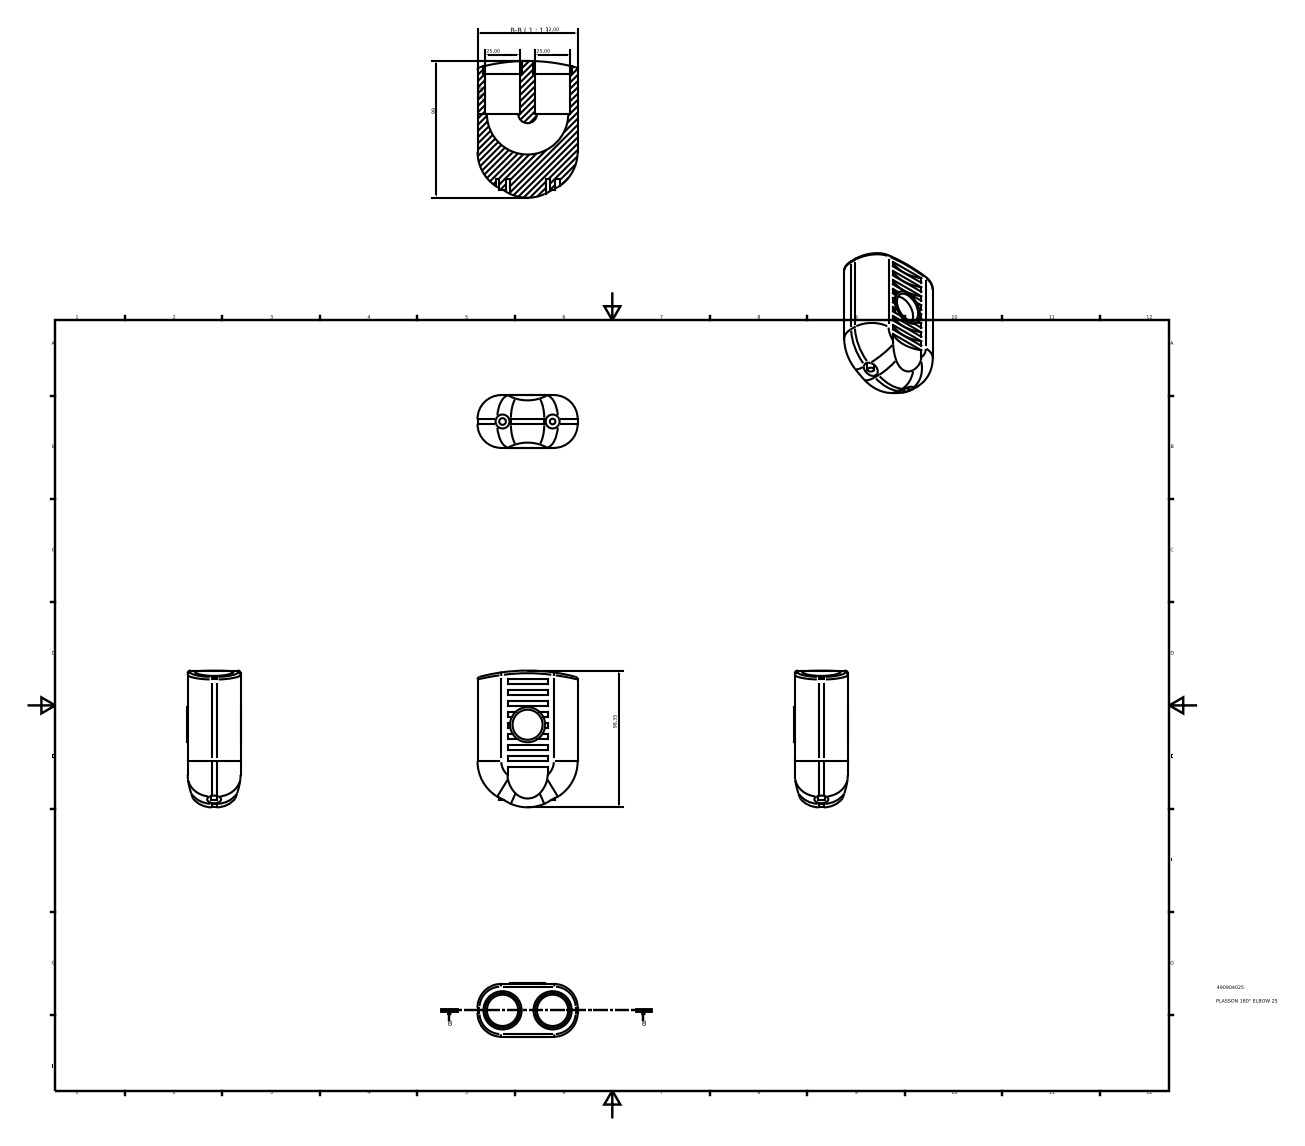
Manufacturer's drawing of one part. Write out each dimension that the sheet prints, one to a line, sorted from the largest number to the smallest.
99
98,35
72,00
38,00
25,00
25,00
